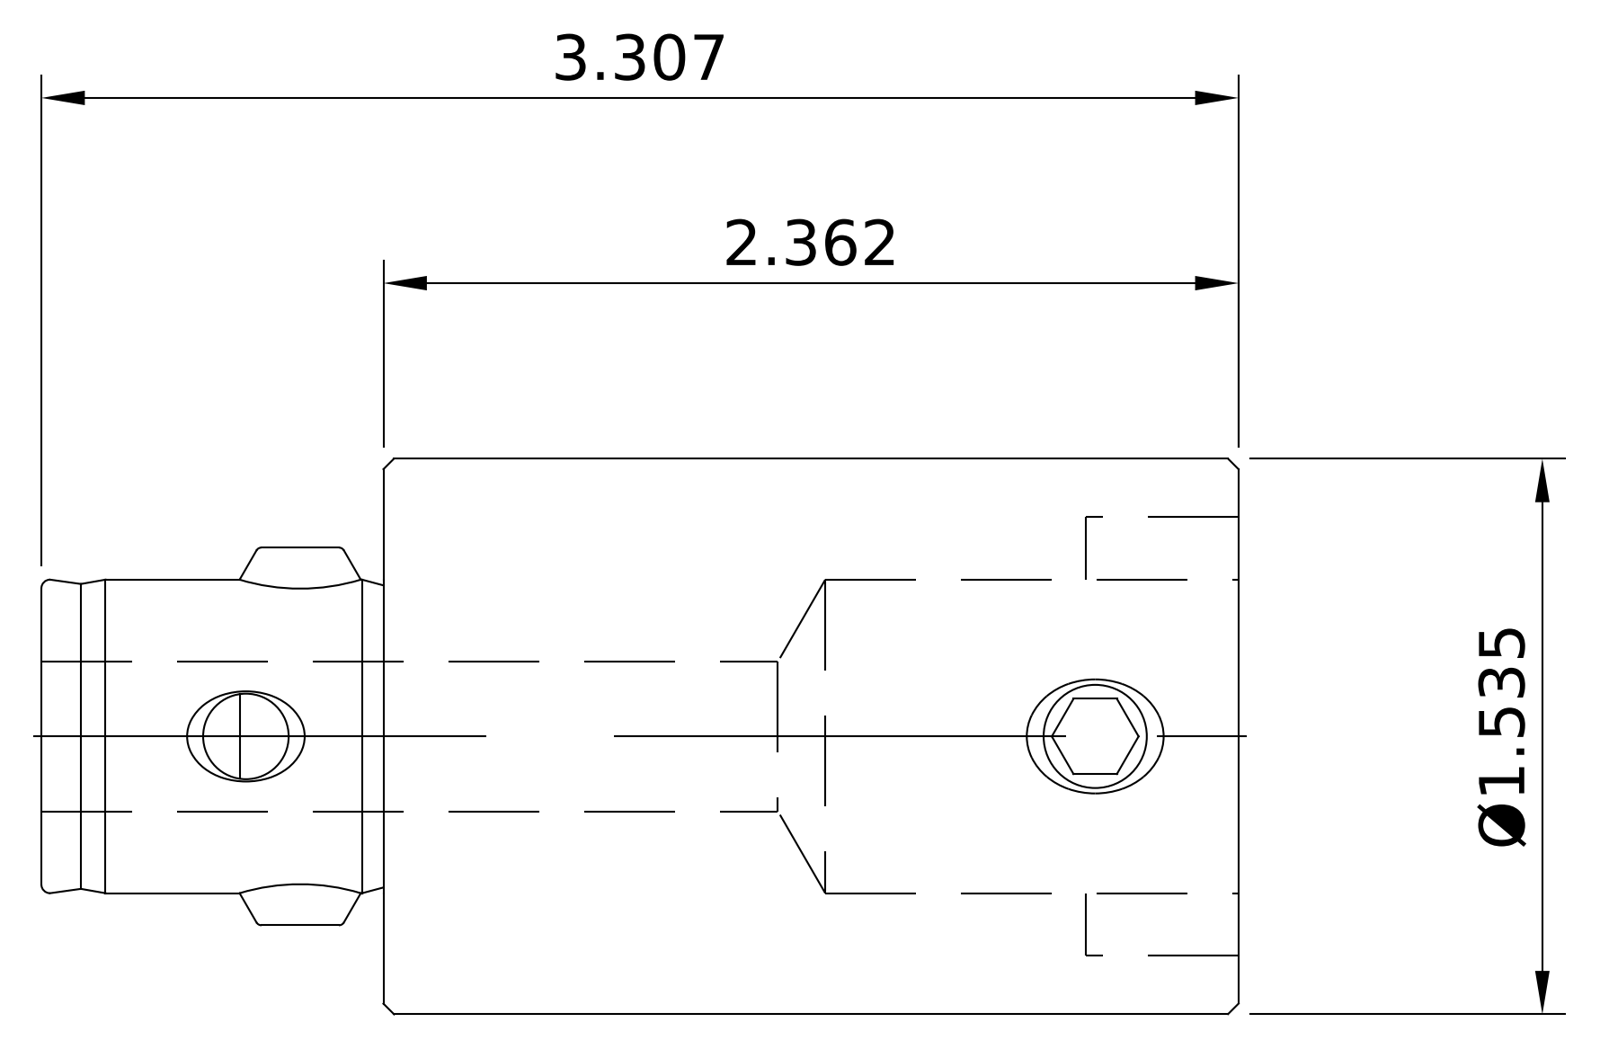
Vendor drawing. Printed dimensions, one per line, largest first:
3.307
2.362
Ø1.535
